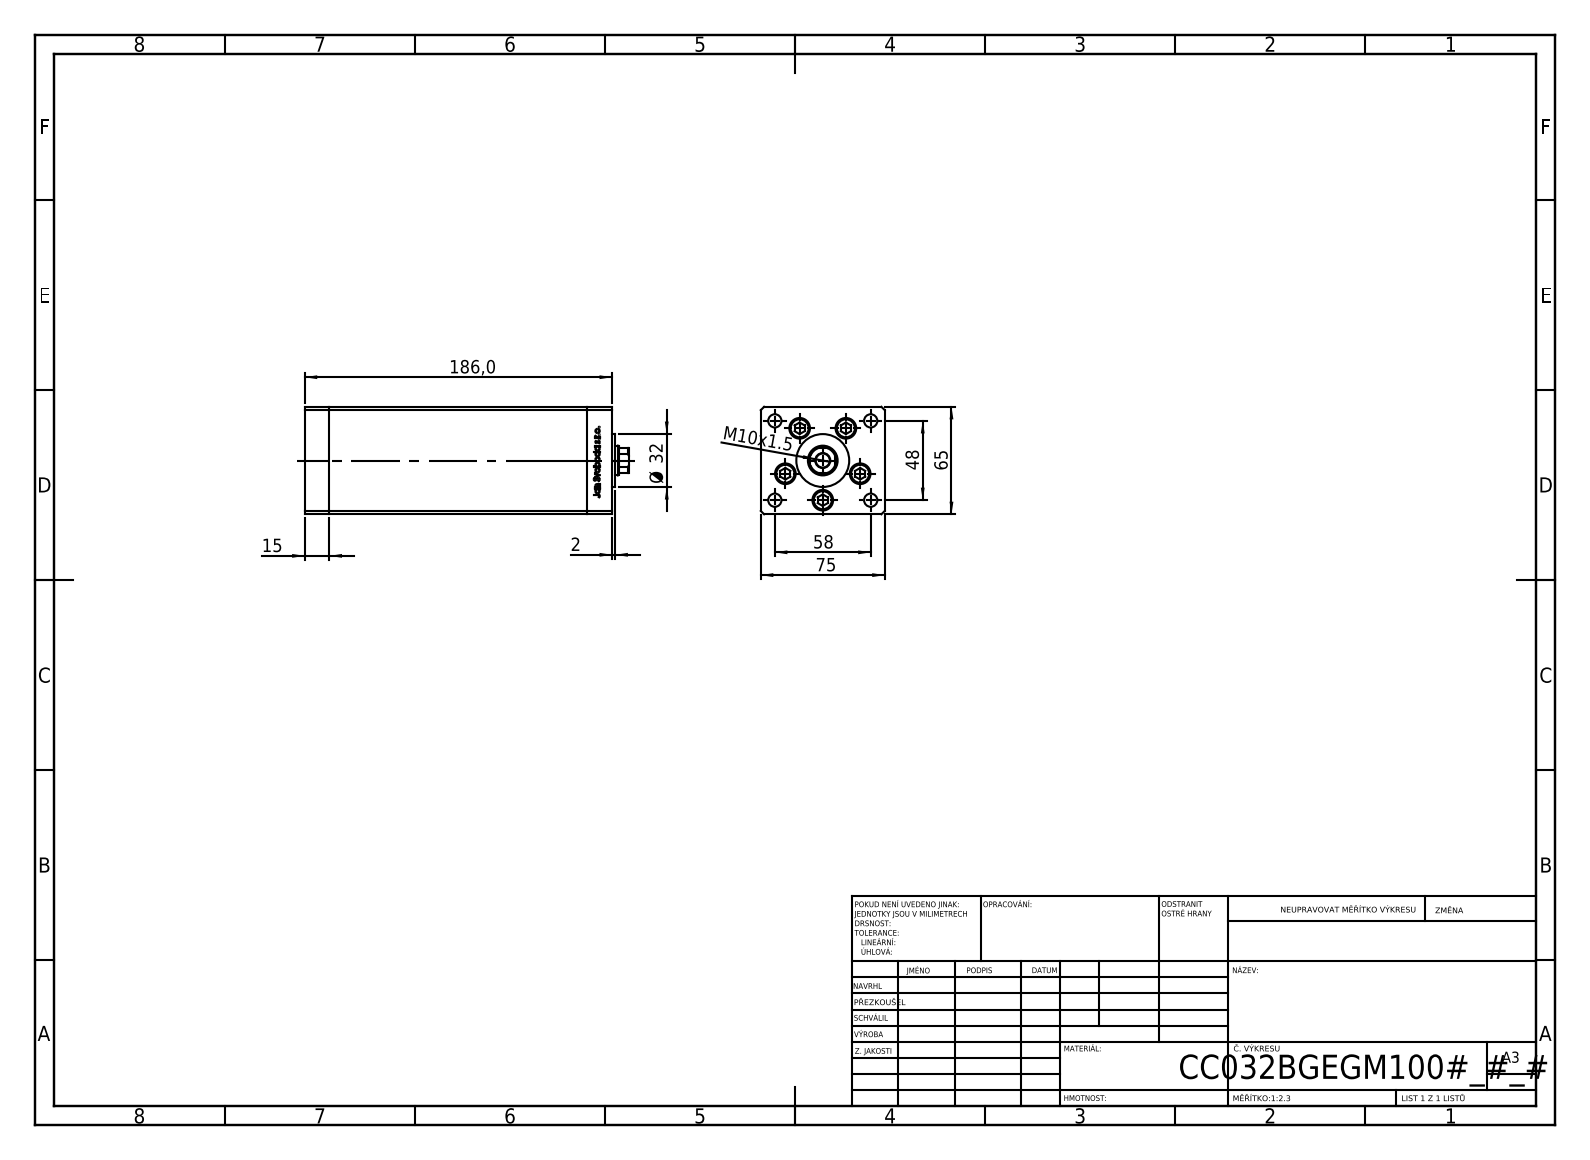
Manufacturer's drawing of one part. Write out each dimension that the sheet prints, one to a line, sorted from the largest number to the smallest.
186,0
75
65
58
48
Ø 32
15
M10x1.5
2
